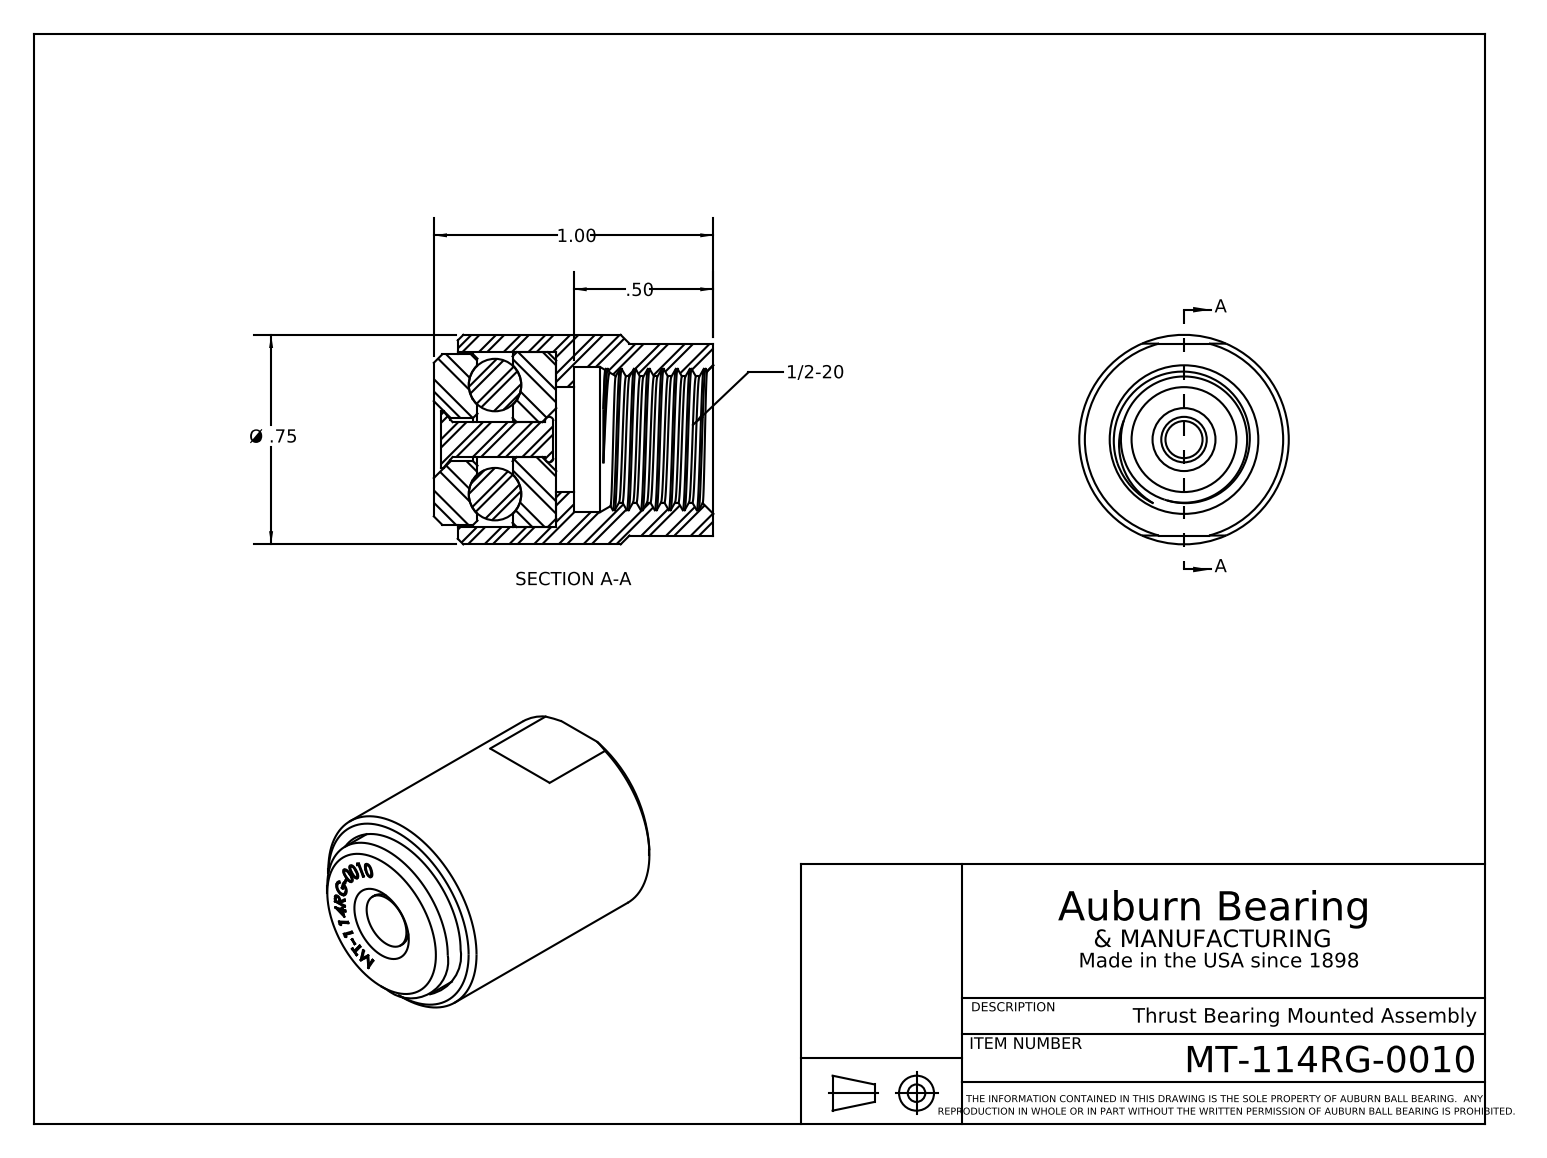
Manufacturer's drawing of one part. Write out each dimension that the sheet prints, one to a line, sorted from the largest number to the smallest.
1.00
Ø .75
.50
